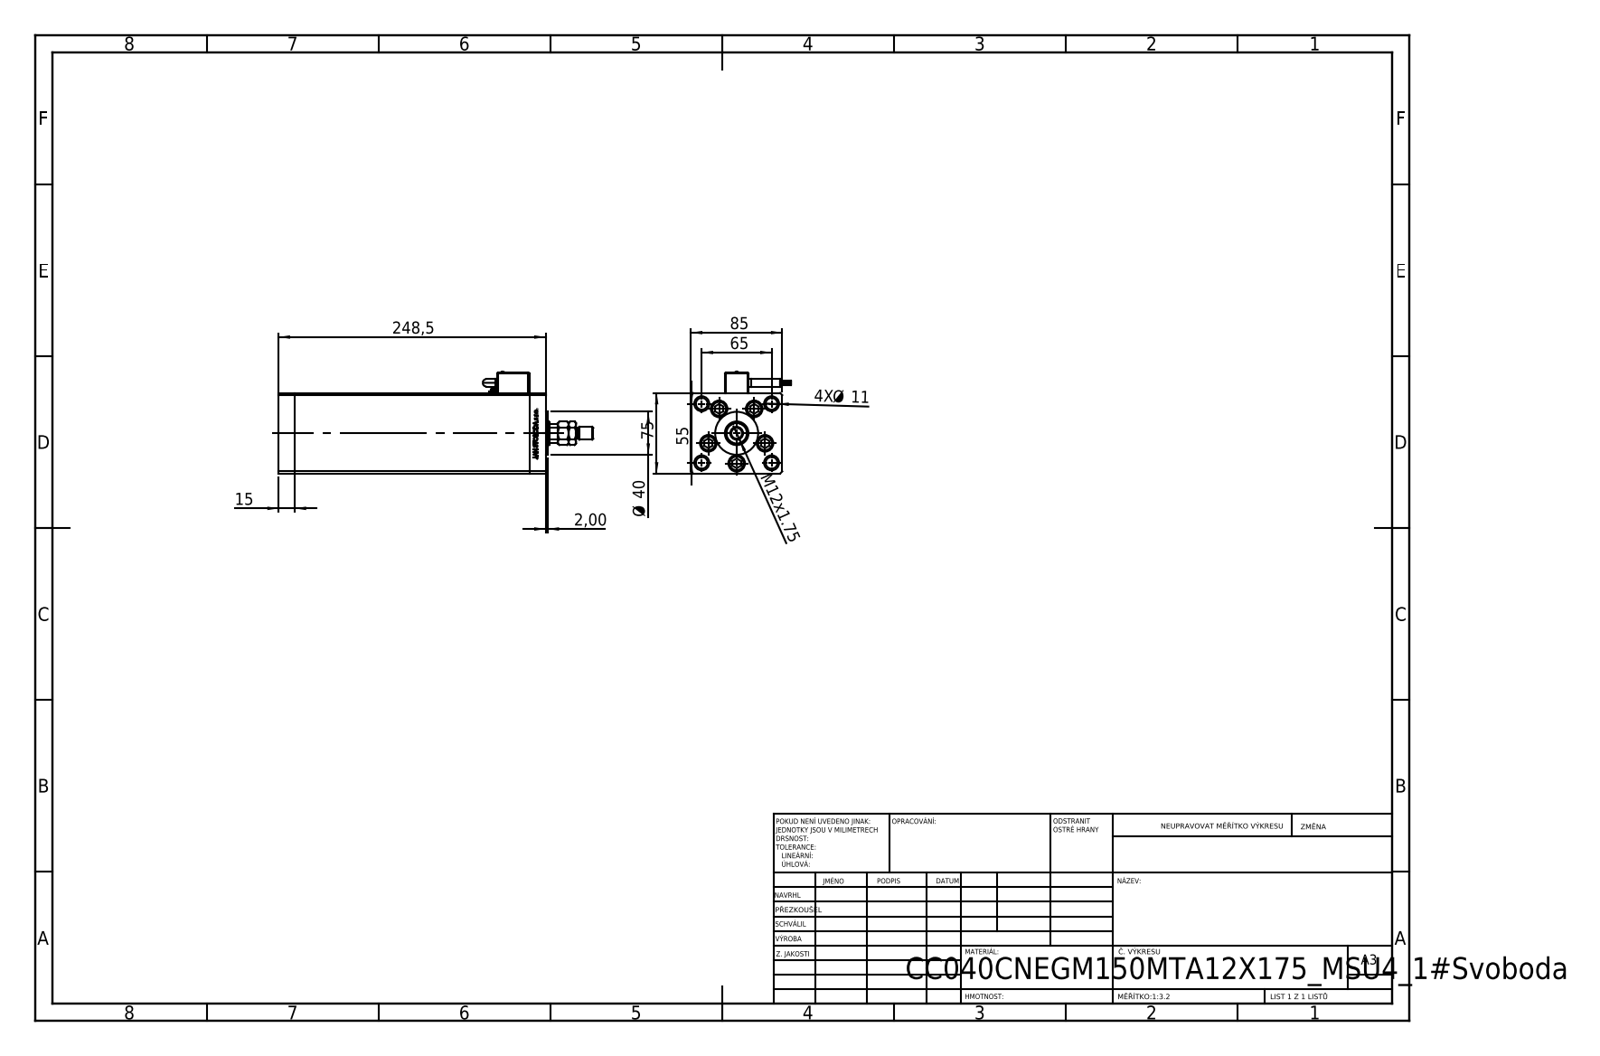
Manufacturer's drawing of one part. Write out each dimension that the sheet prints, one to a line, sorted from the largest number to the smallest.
248,5
85
75
65
55
Ø 40
15
M12x1.75
4X Ø 11
2,00
